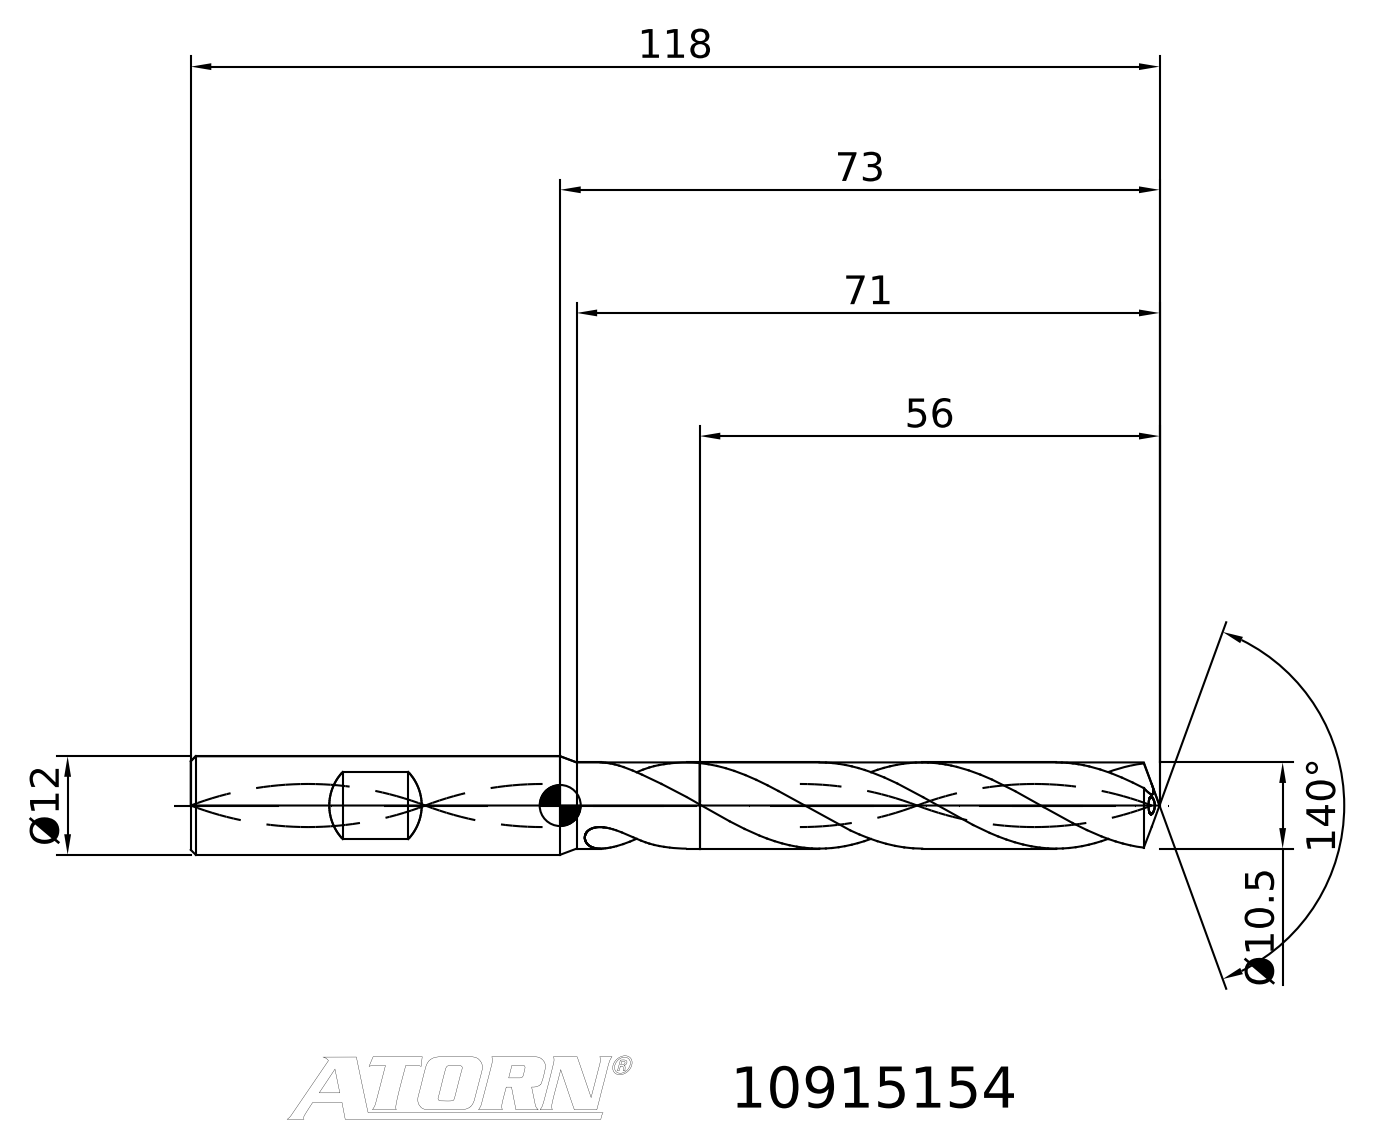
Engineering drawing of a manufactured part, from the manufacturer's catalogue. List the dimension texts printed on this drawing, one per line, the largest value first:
140°
118
73
71
56
Ø12
Ø10.5
